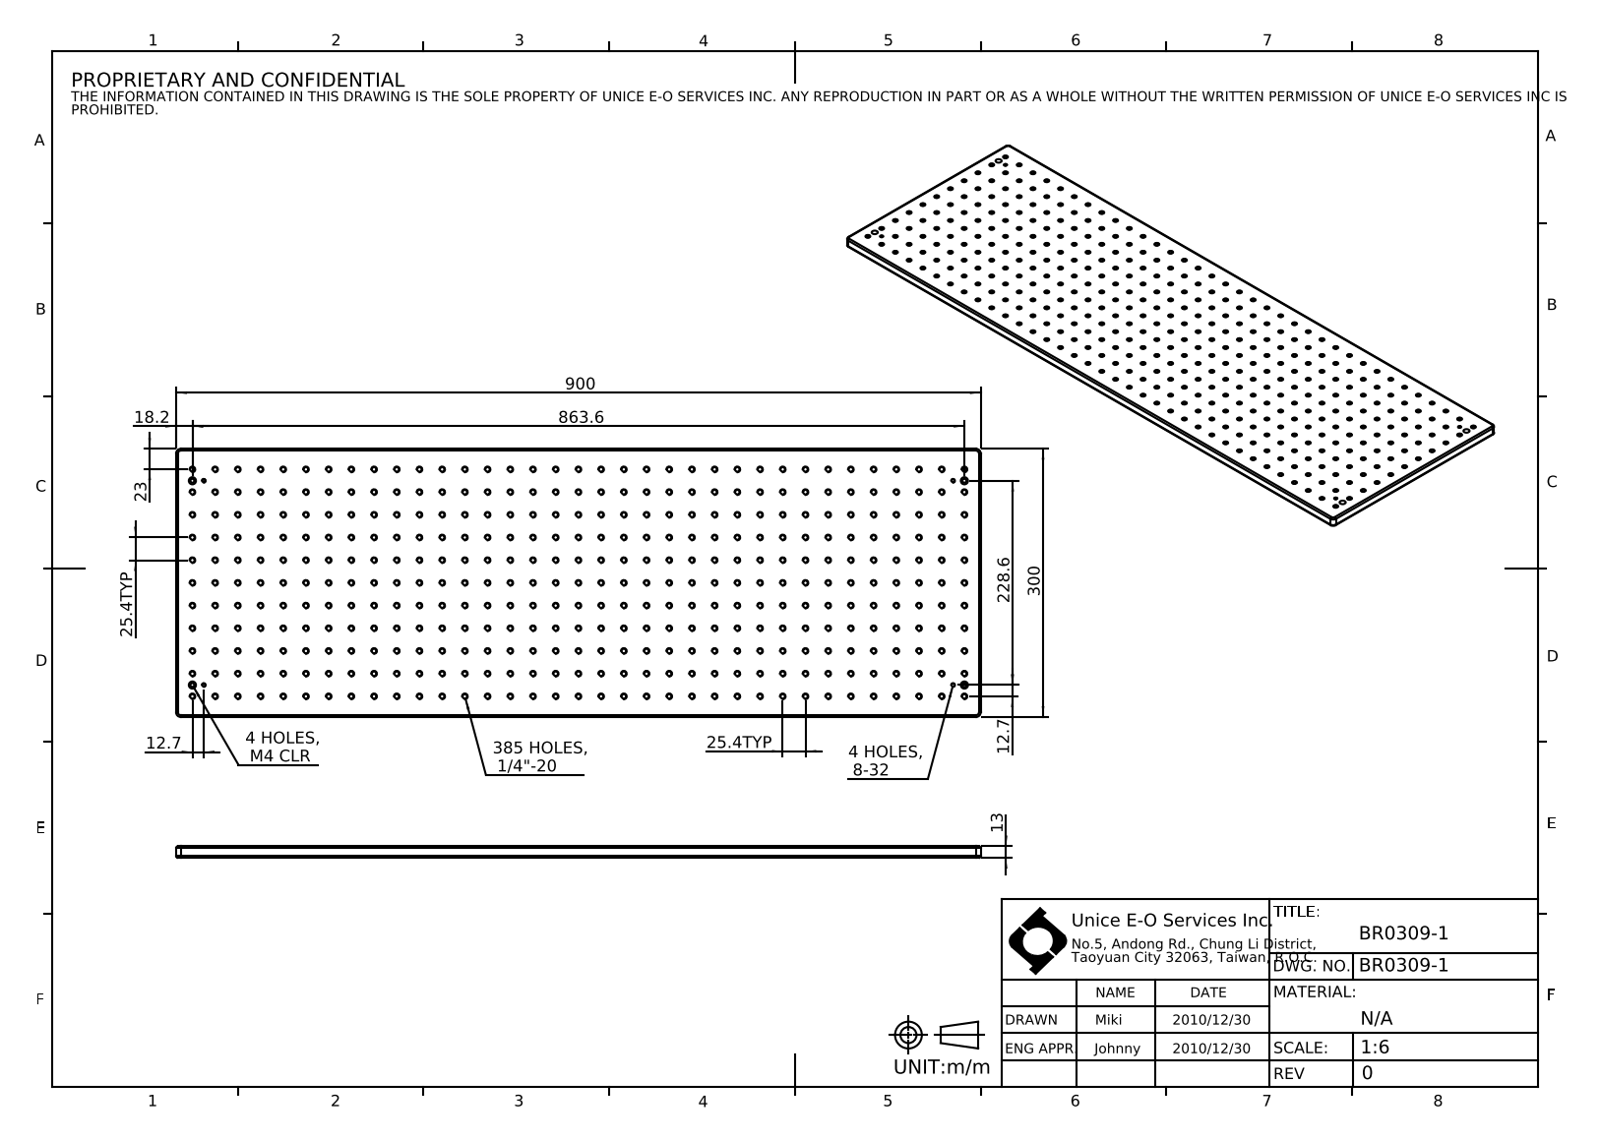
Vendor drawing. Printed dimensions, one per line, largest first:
900
863.6
385 HOLES, 1/4"-20
300
228.6
25.4 TYP
25.4 TYP
23
18.2
13
12.7
12.7
4 HOLES, 8-32
4 HOLES, M4 CLR
